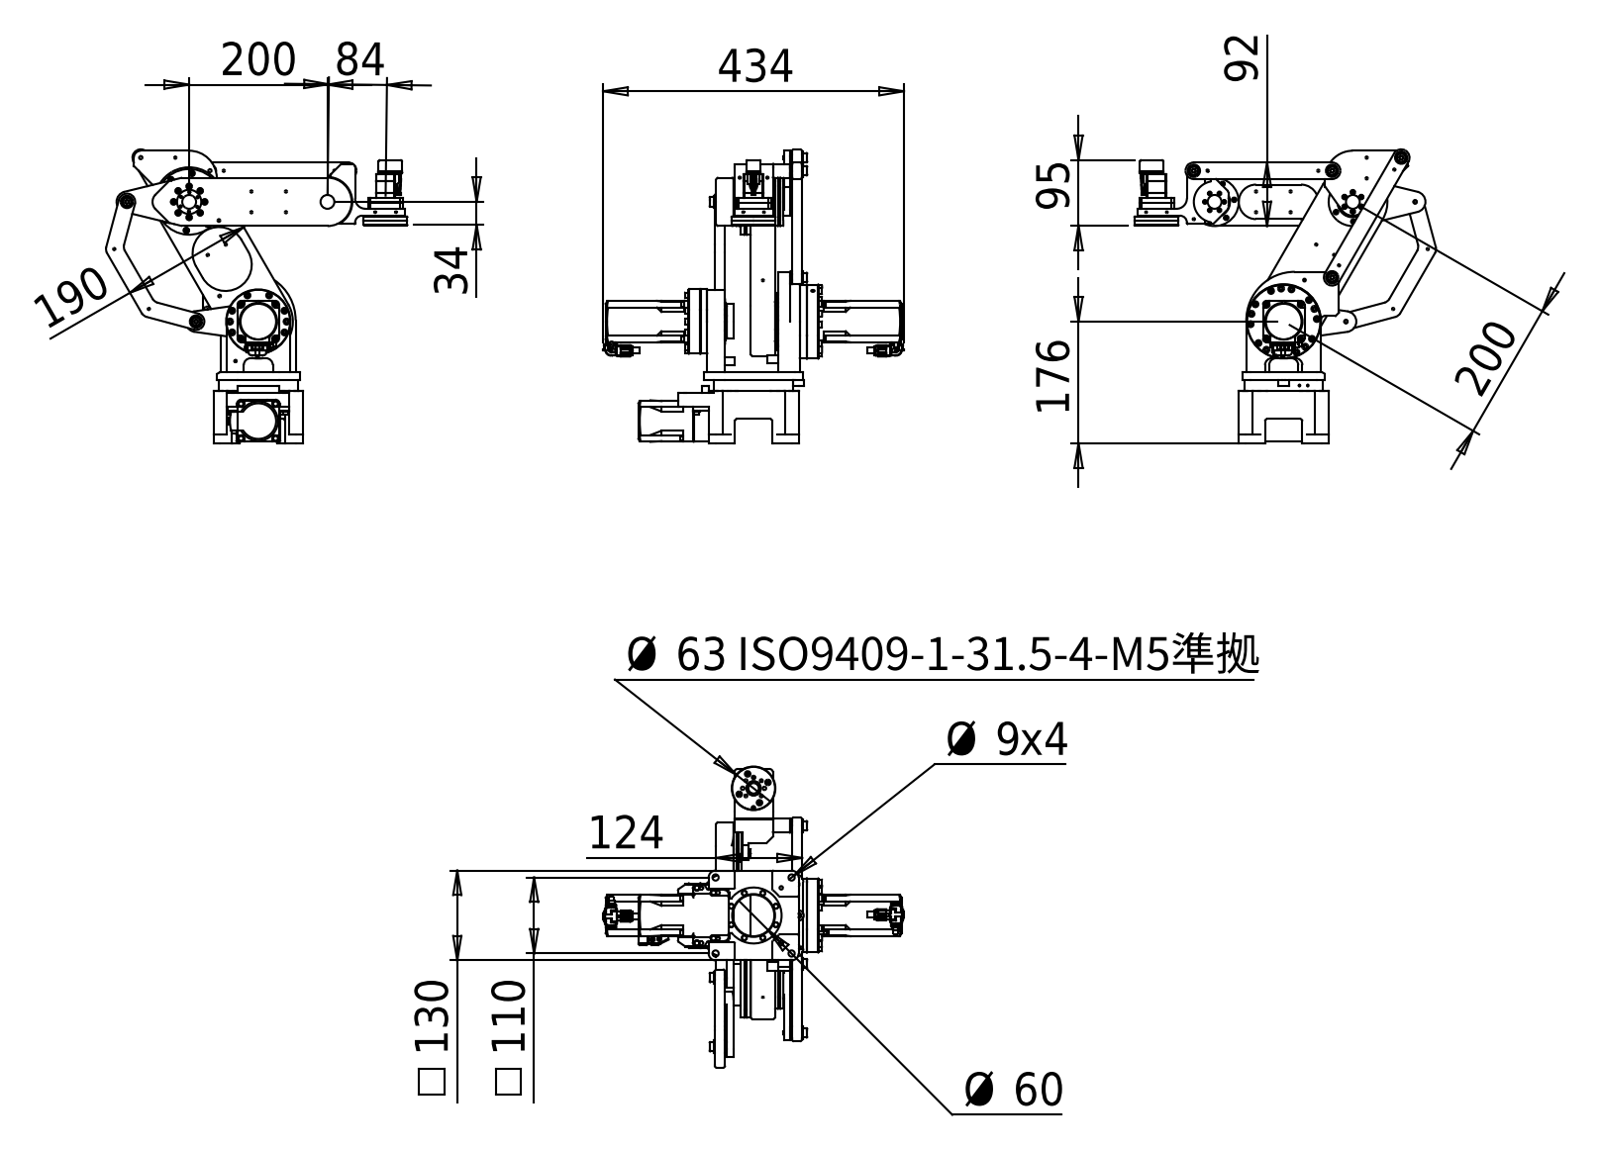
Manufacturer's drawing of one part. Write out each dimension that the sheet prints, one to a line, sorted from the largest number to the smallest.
434
200
200
190
176
130
124
110
95
92
84
Ø 63 ISO9409-1-31.5-4-M5準拠
Ø 60
34
Ø 9 x4
